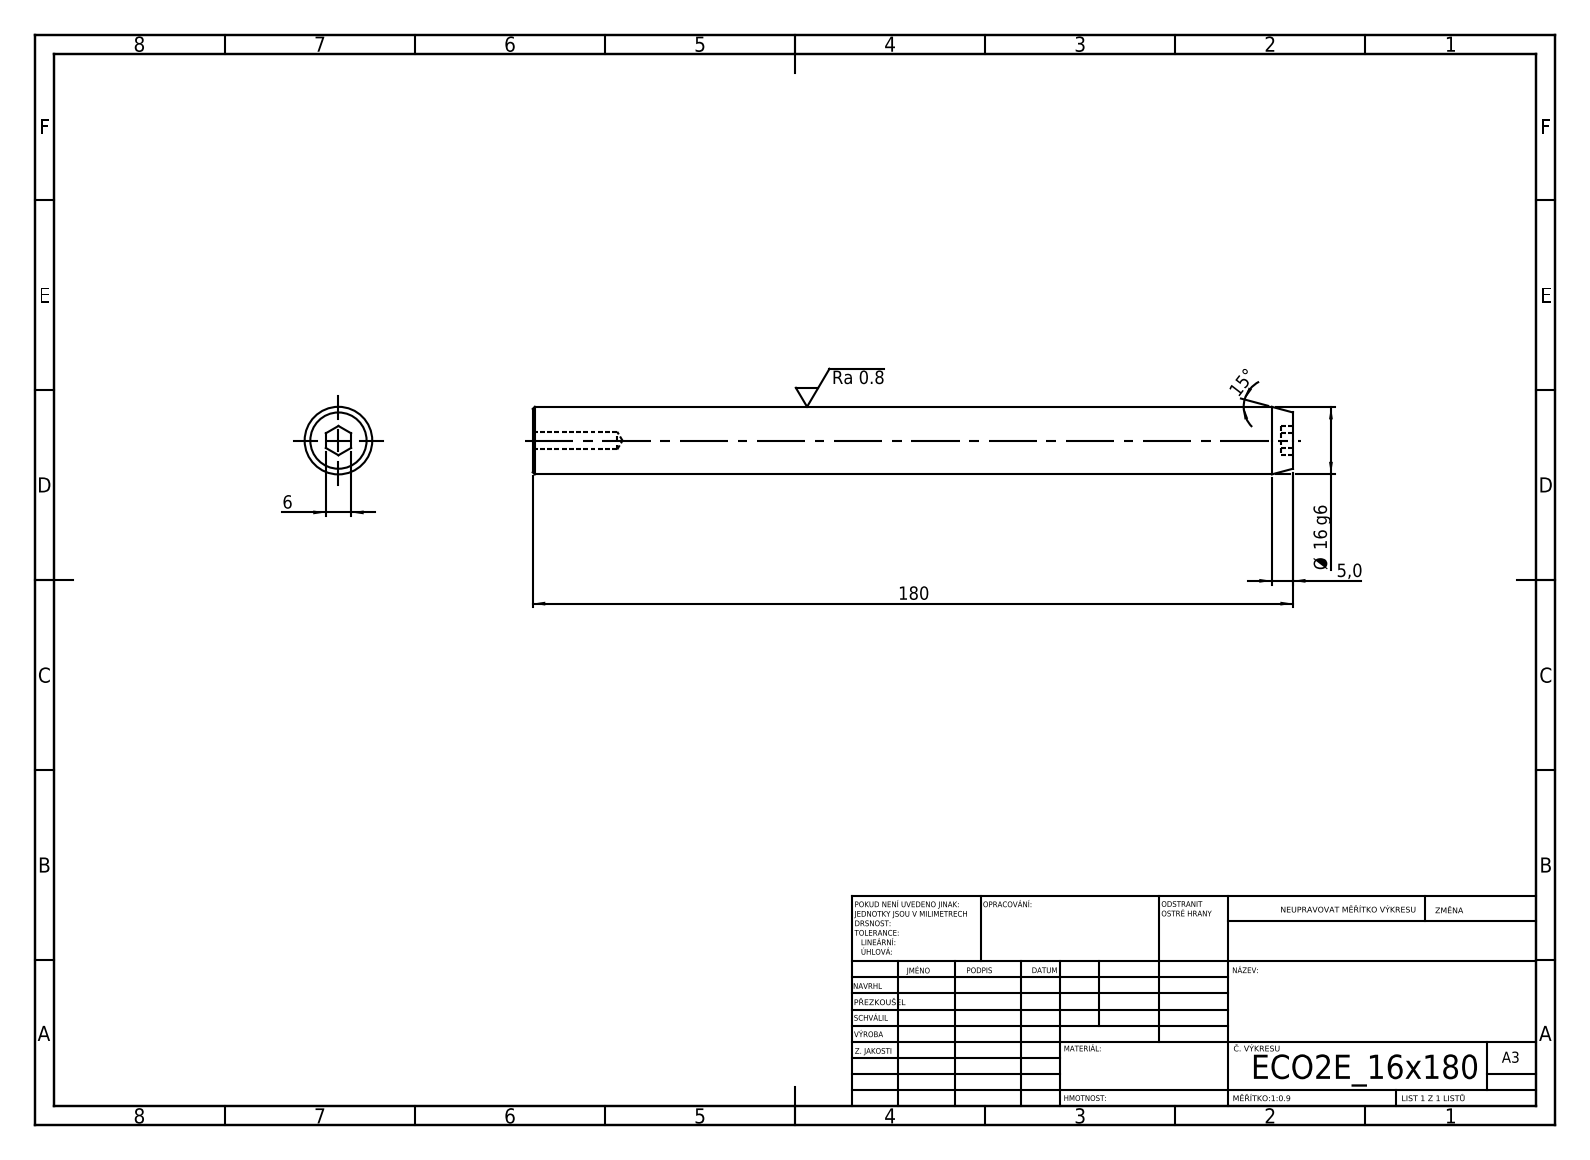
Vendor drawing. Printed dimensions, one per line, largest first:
180
Ø 16 g6
15°
6
5,0
